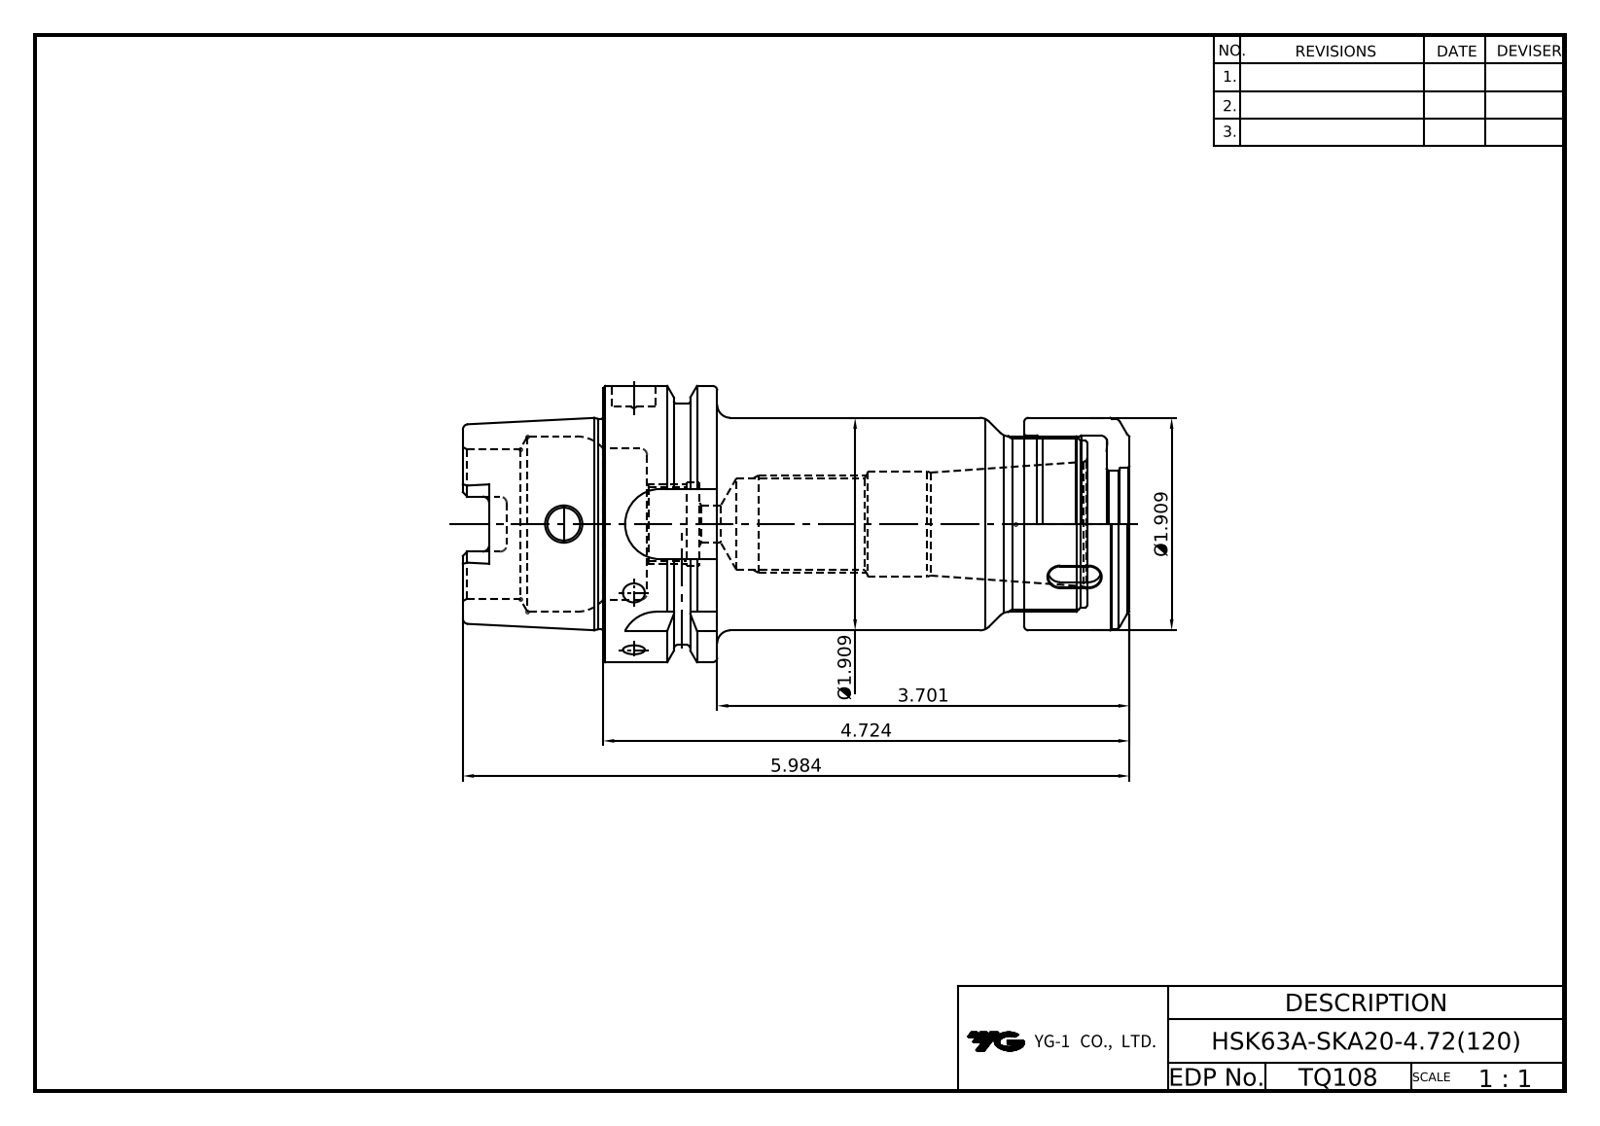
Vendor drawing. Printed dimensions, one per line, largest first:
5.984
4.724
3.701
Ø1.909
Ø1.909
